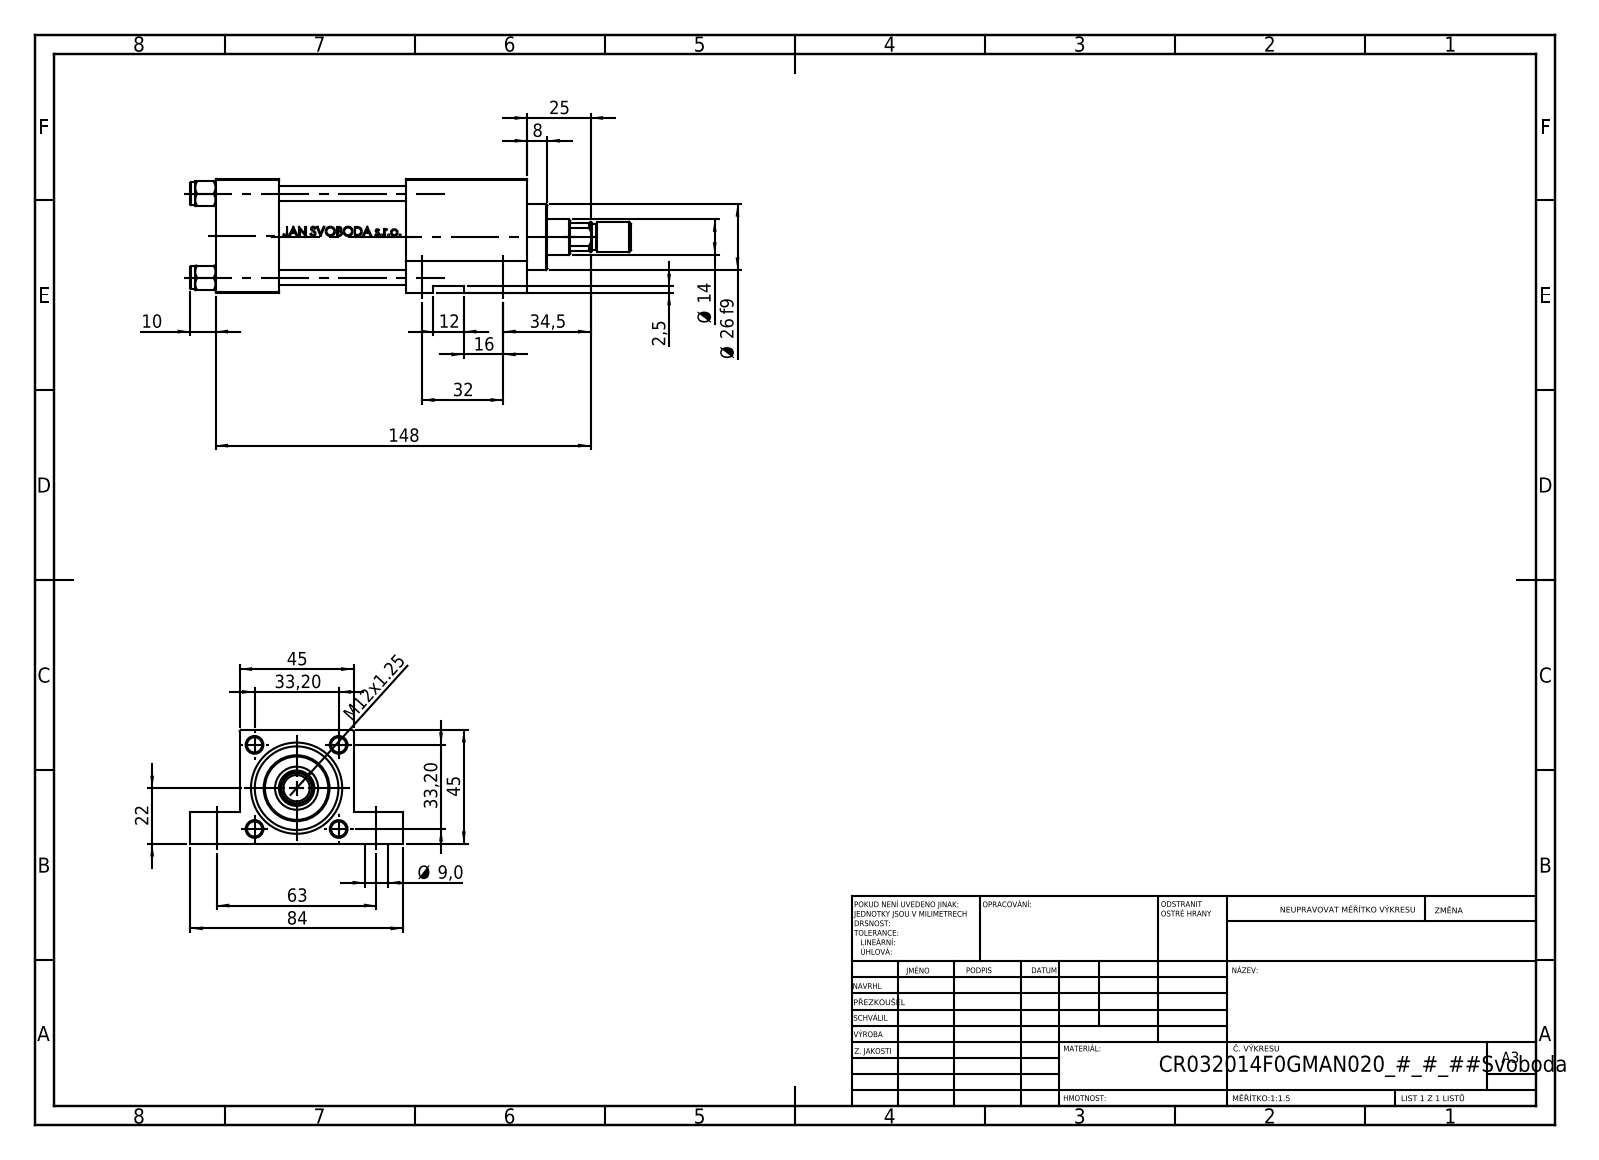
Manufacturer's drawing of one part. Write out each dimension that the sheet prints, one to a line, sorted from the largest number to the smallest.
148
84
63
45
45
34,5
33,20
33,20
32
Ø 26 f9
25
22
16
Ø 14
12
M12x1.25
10
Ø 9,0
8
2,5
